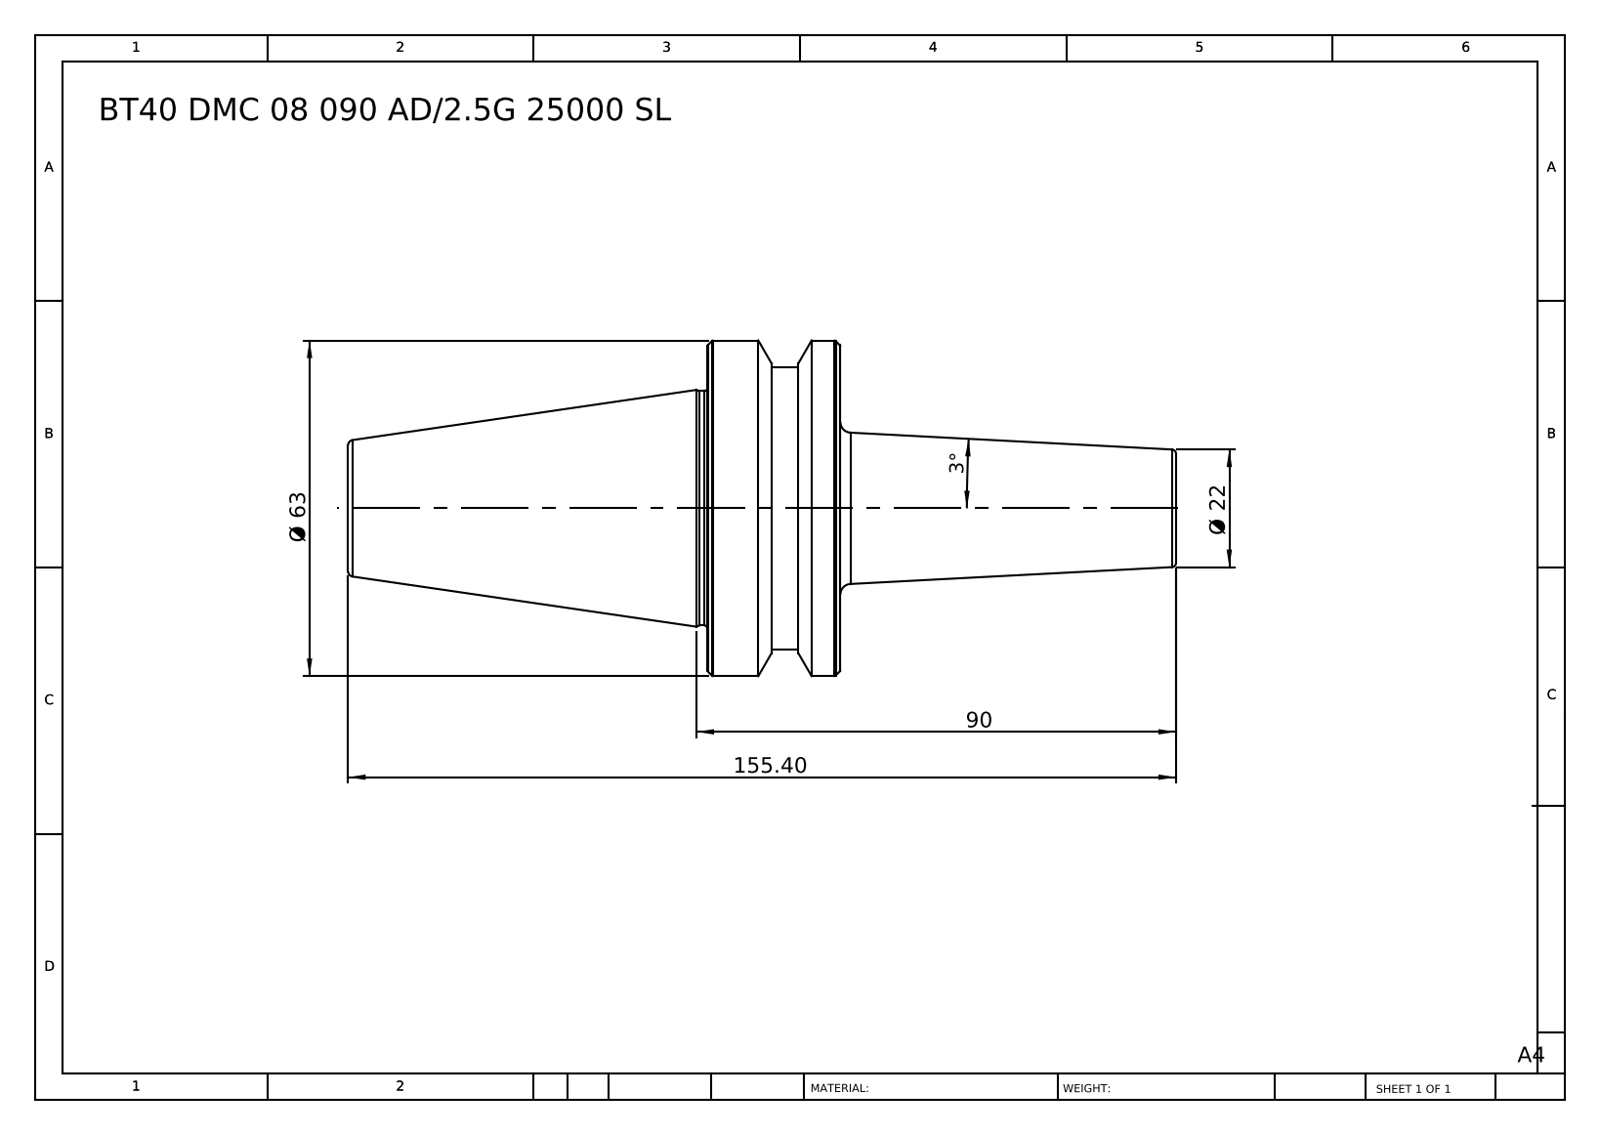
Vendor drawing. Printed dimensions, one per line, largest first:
155.40
90
Ø 63
Ø 22
3°
